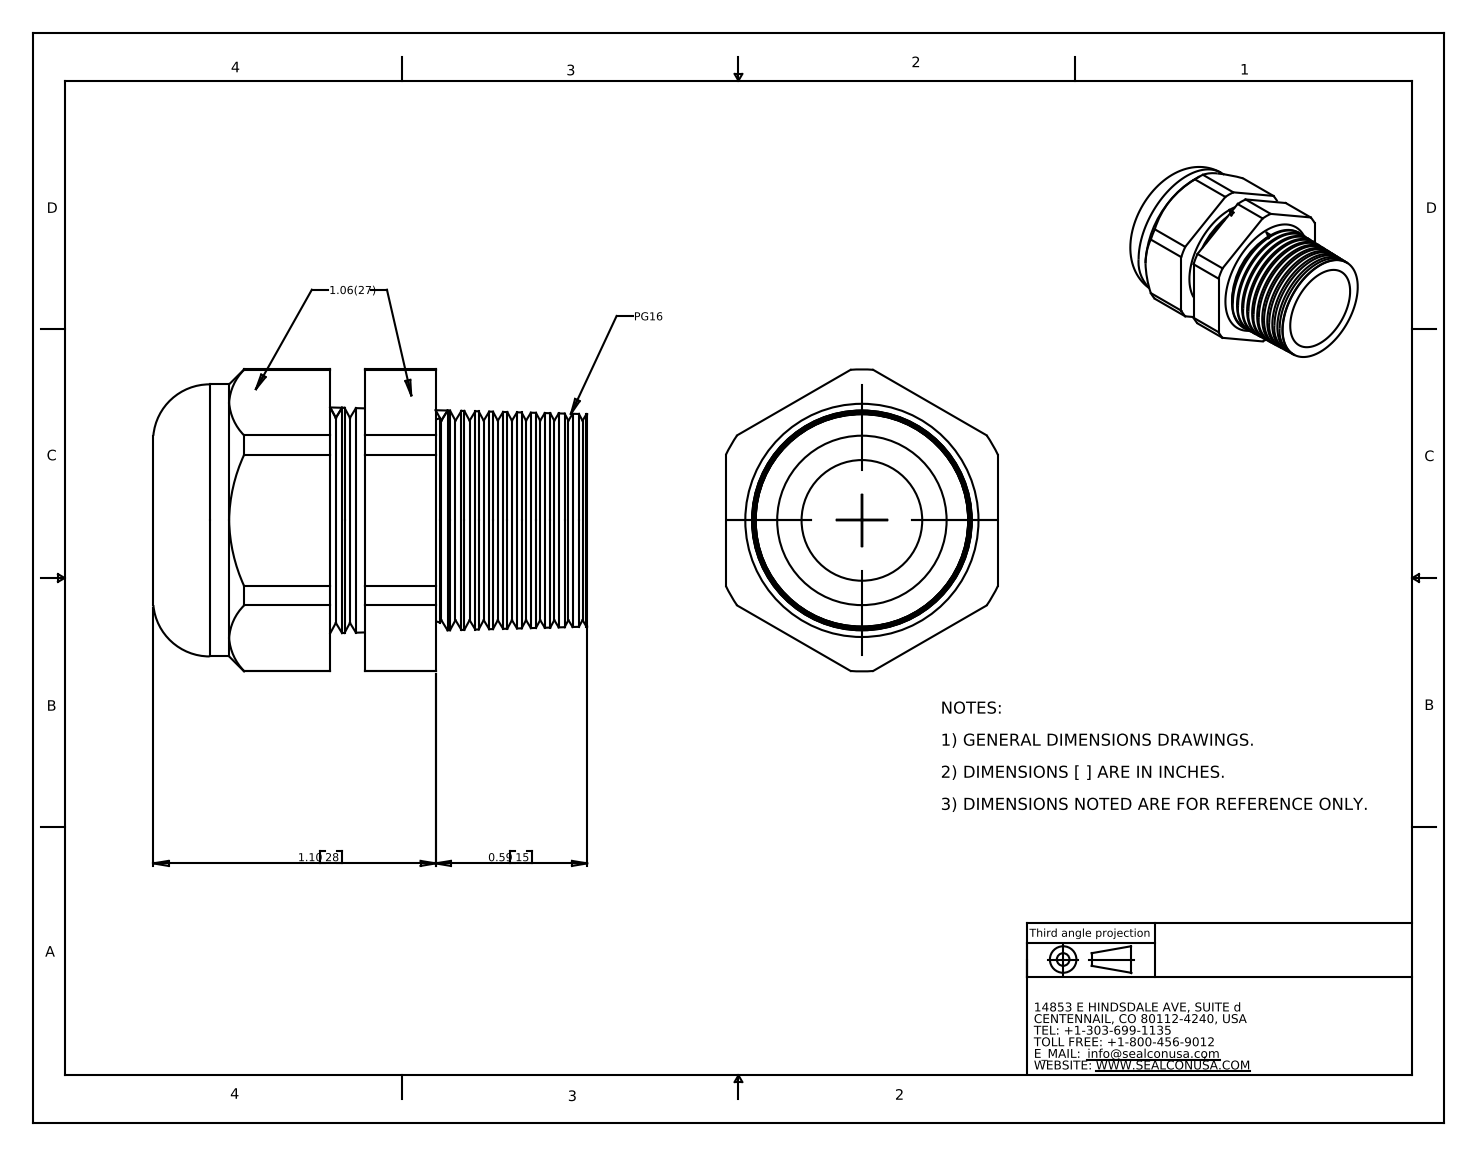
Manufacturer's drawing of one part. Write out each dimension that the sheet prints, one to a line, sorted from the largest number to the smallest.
1.10 28
0.59 15
